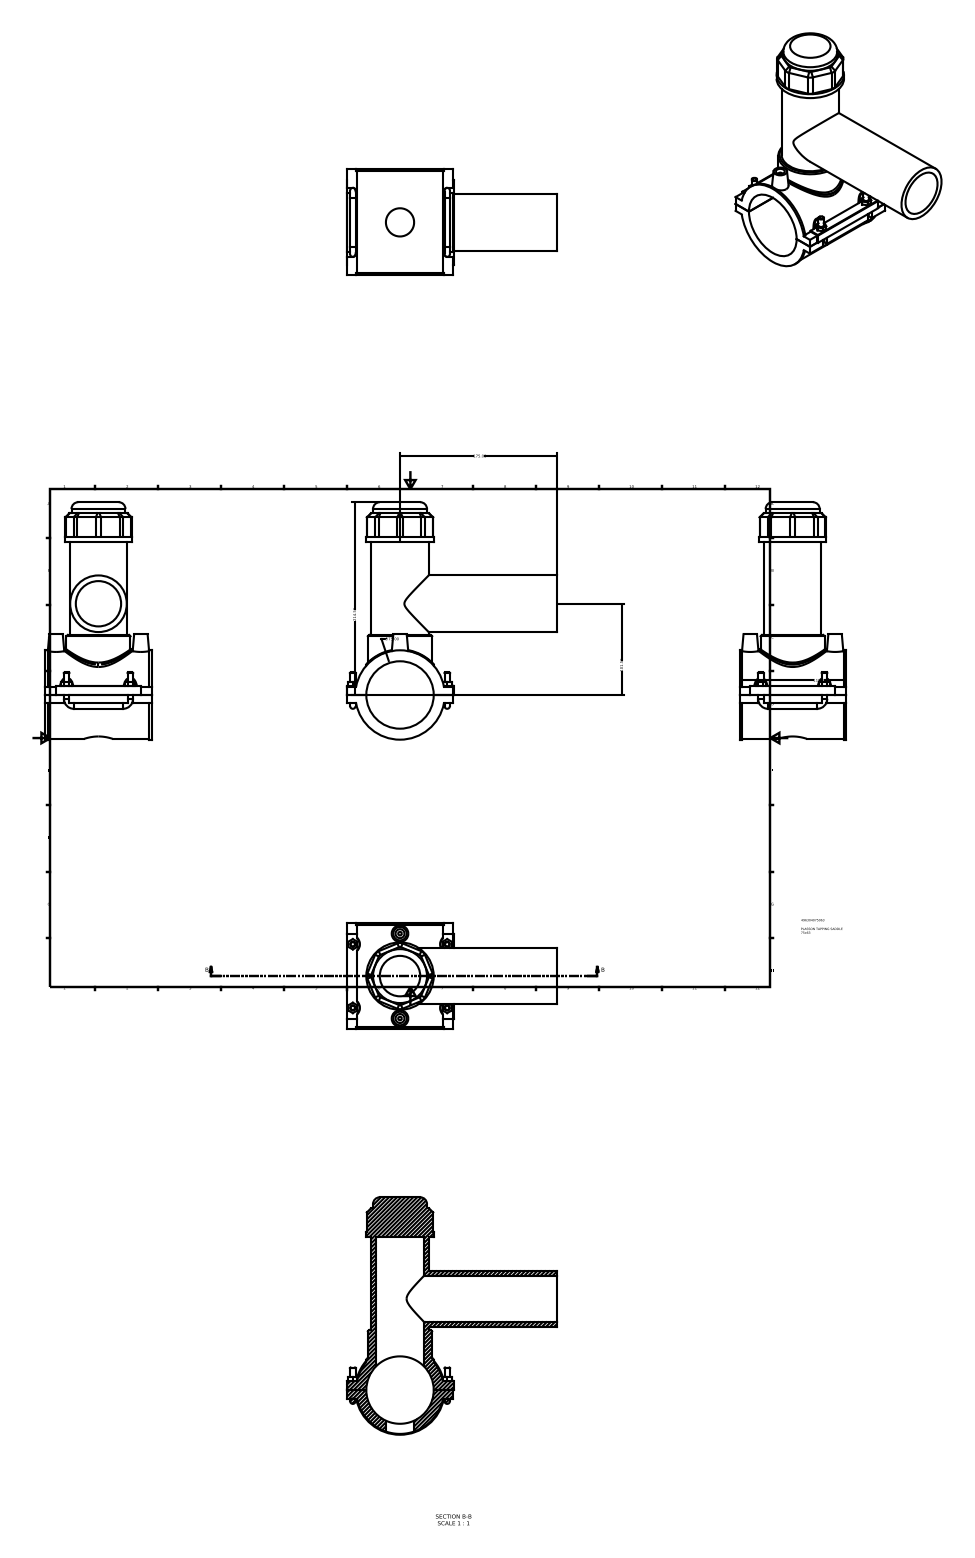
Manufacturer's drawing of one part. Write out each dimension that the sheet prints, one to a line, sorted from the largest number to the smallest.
214.50
175.00
118.00
101.50
∅75.00
